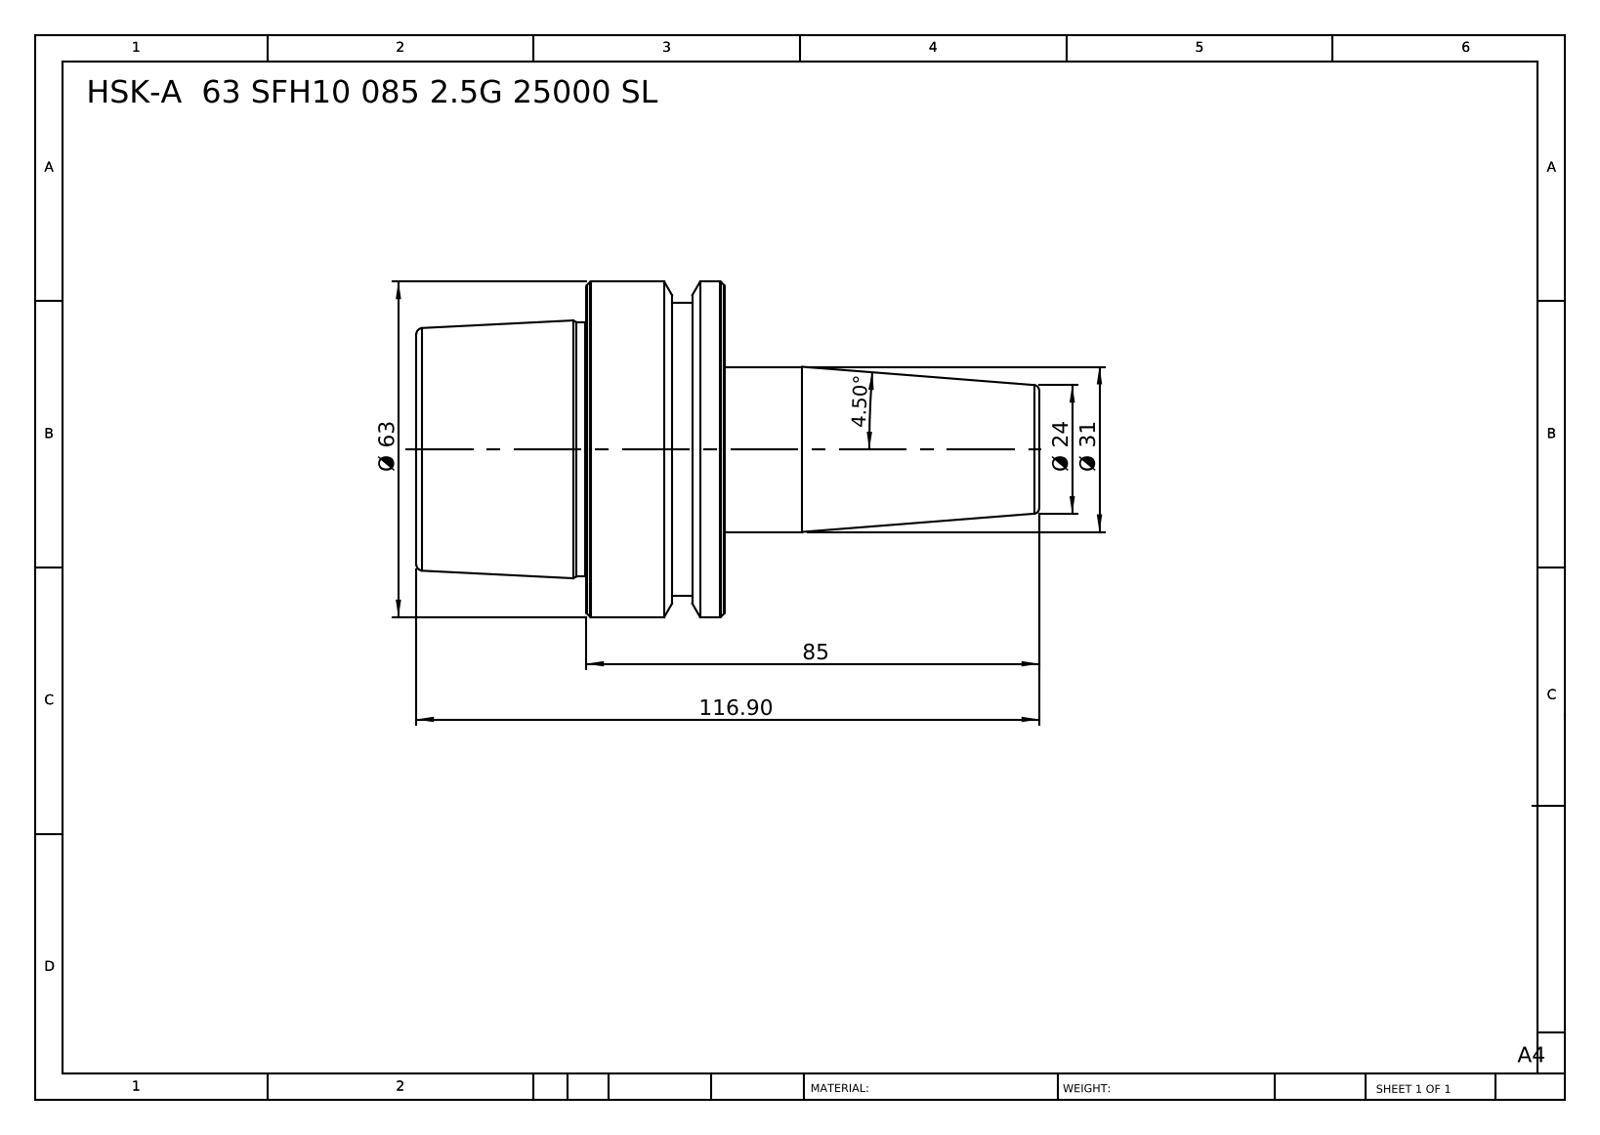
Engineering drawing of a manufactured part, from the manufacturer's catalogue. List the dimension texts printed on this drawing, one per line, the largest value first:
116.90
85
Ø 63
Ø 31
Ø 24
4.50°
